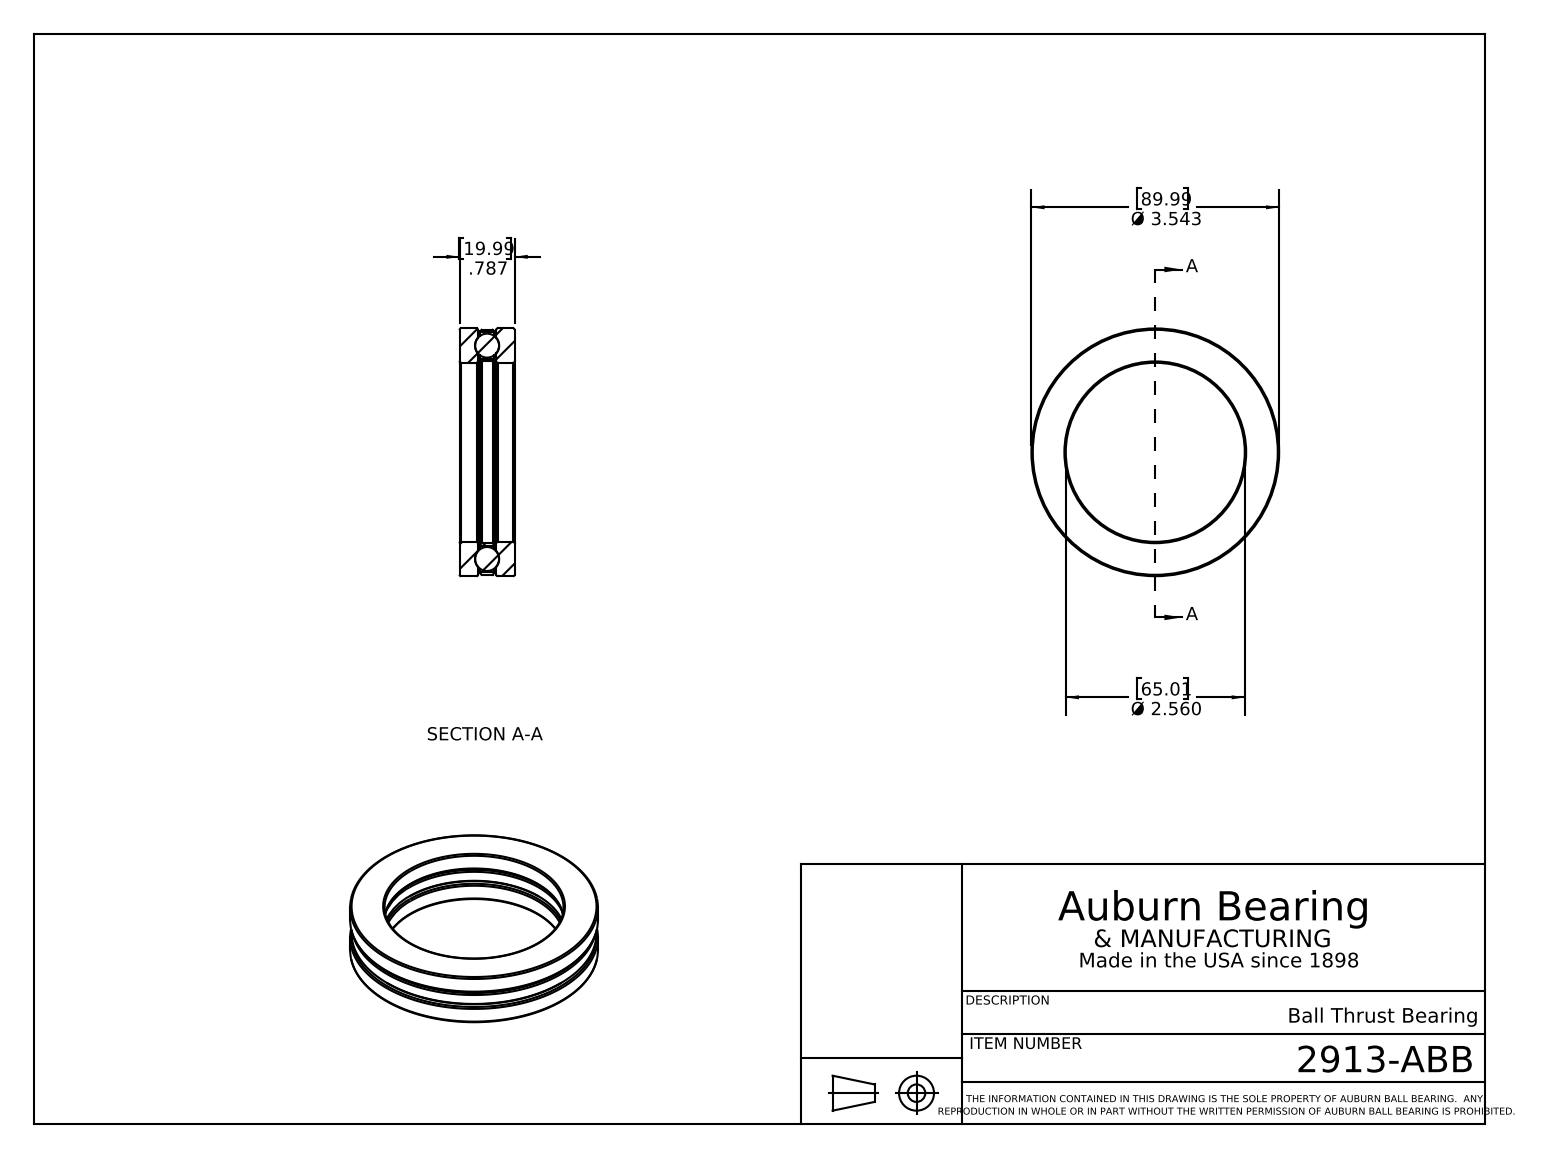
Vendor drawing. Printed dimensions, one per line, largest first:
89.99 Ø 3.543
65.01 Ø 2.560
19.99 .787
